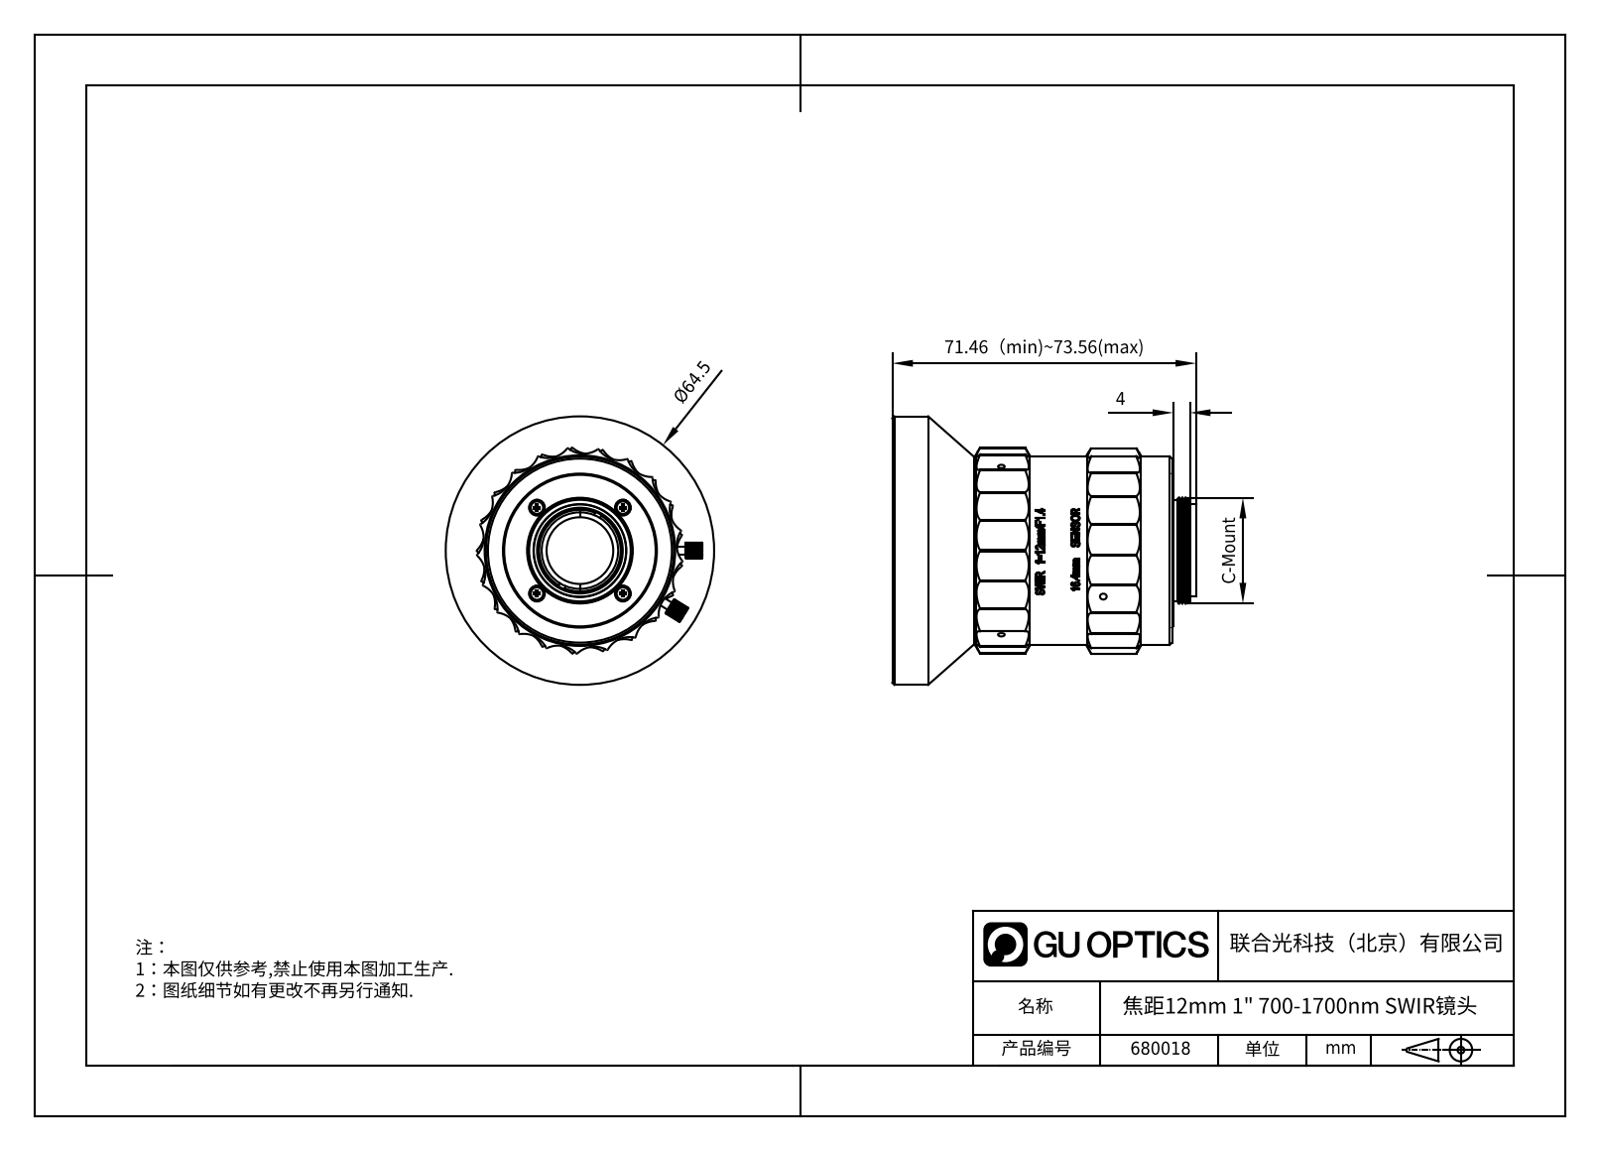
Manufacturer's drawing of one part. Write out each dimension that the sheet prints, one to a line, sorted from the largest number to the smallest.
71.46（min)~73.56(max)
Ø64.5
4
C-Mount
